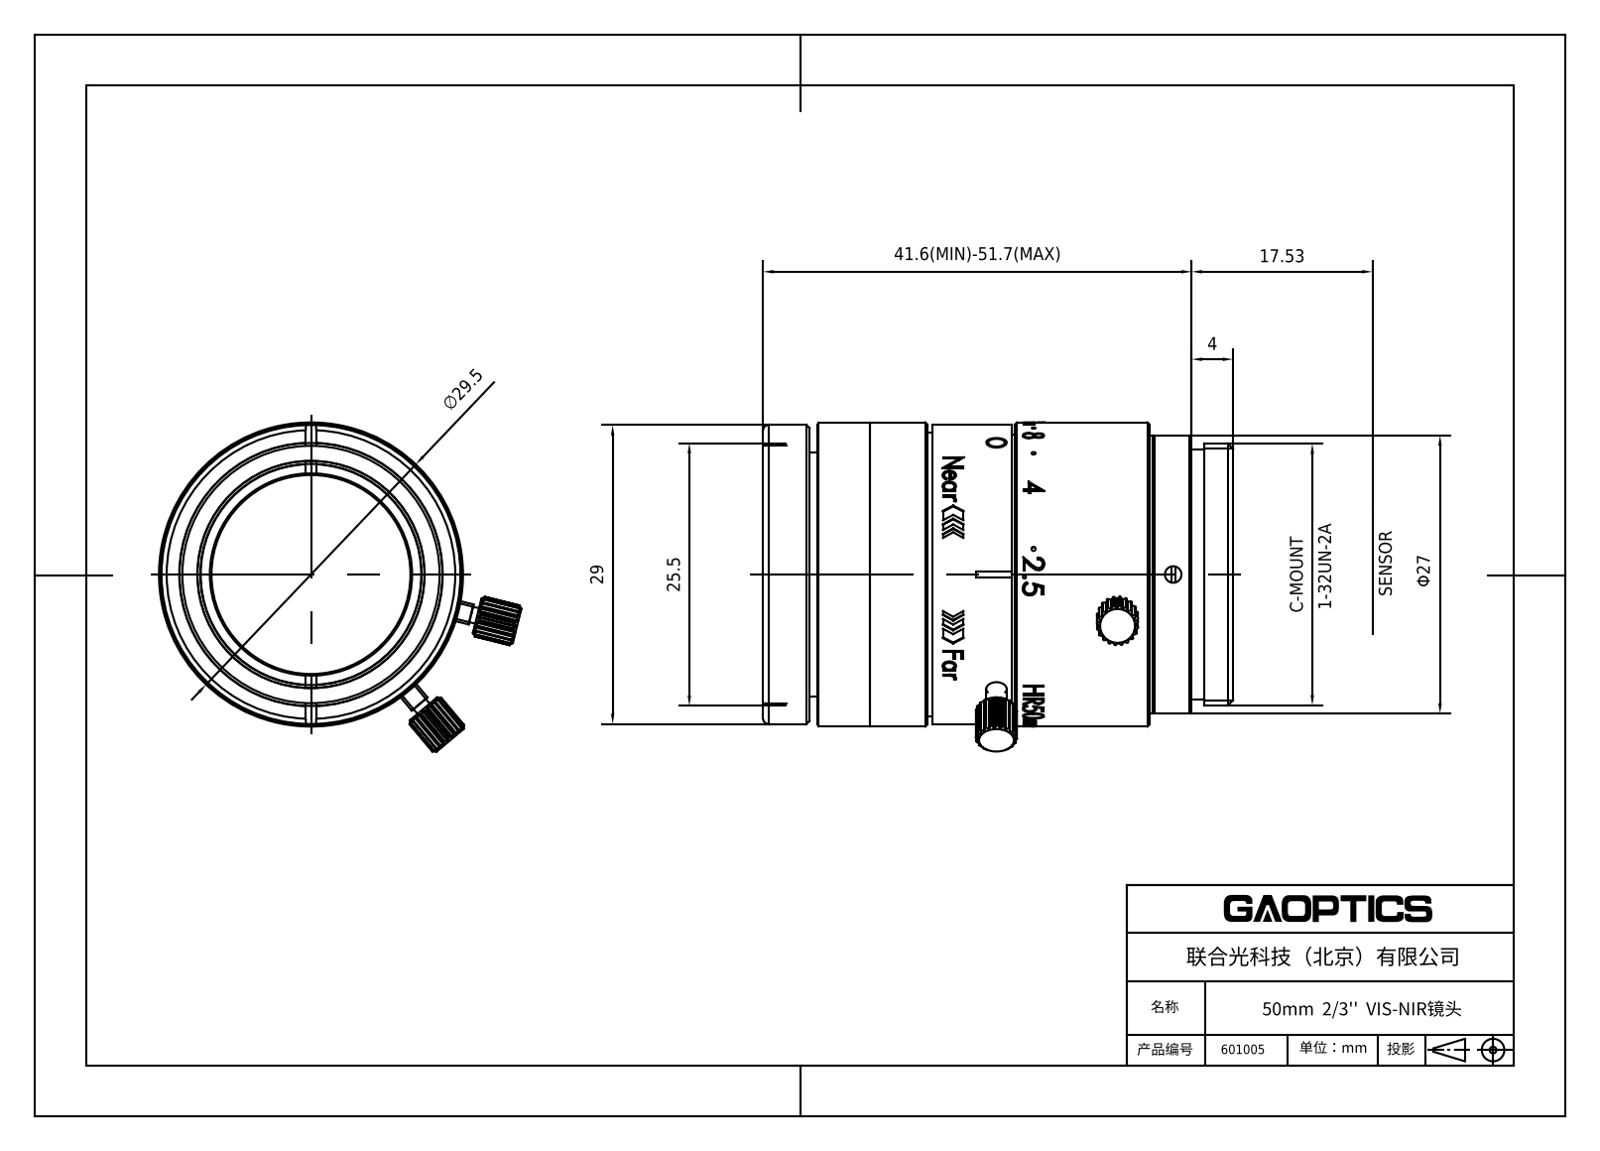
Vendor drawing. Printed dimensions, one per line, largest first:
41.6(MIN)-51.7(MAX)
∅29.5
29
Φ27
25.5
17.53
4
C-MOUNT
